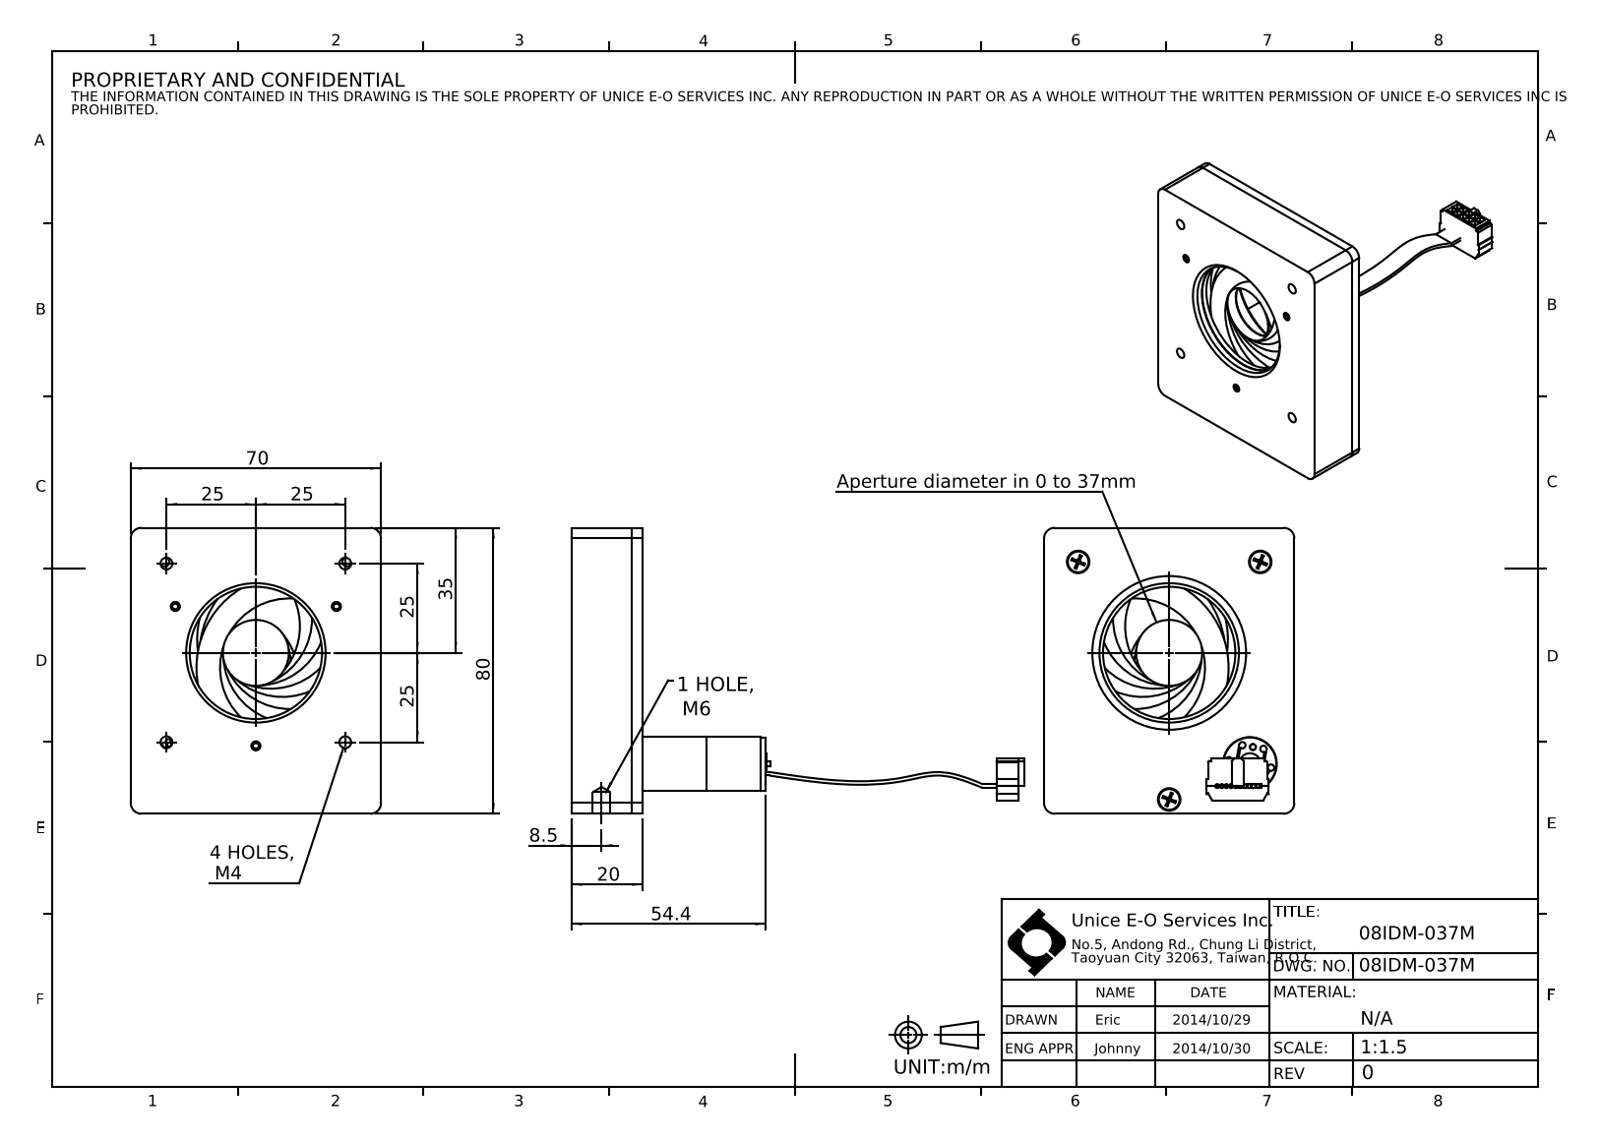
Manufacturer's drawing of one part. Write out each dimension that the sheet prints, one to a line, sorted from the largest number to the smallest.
80
70
54.4
35
25
25
25
25
20
8.5
4 HOLES, M4
Aperture diameter in 0 to 37mm
